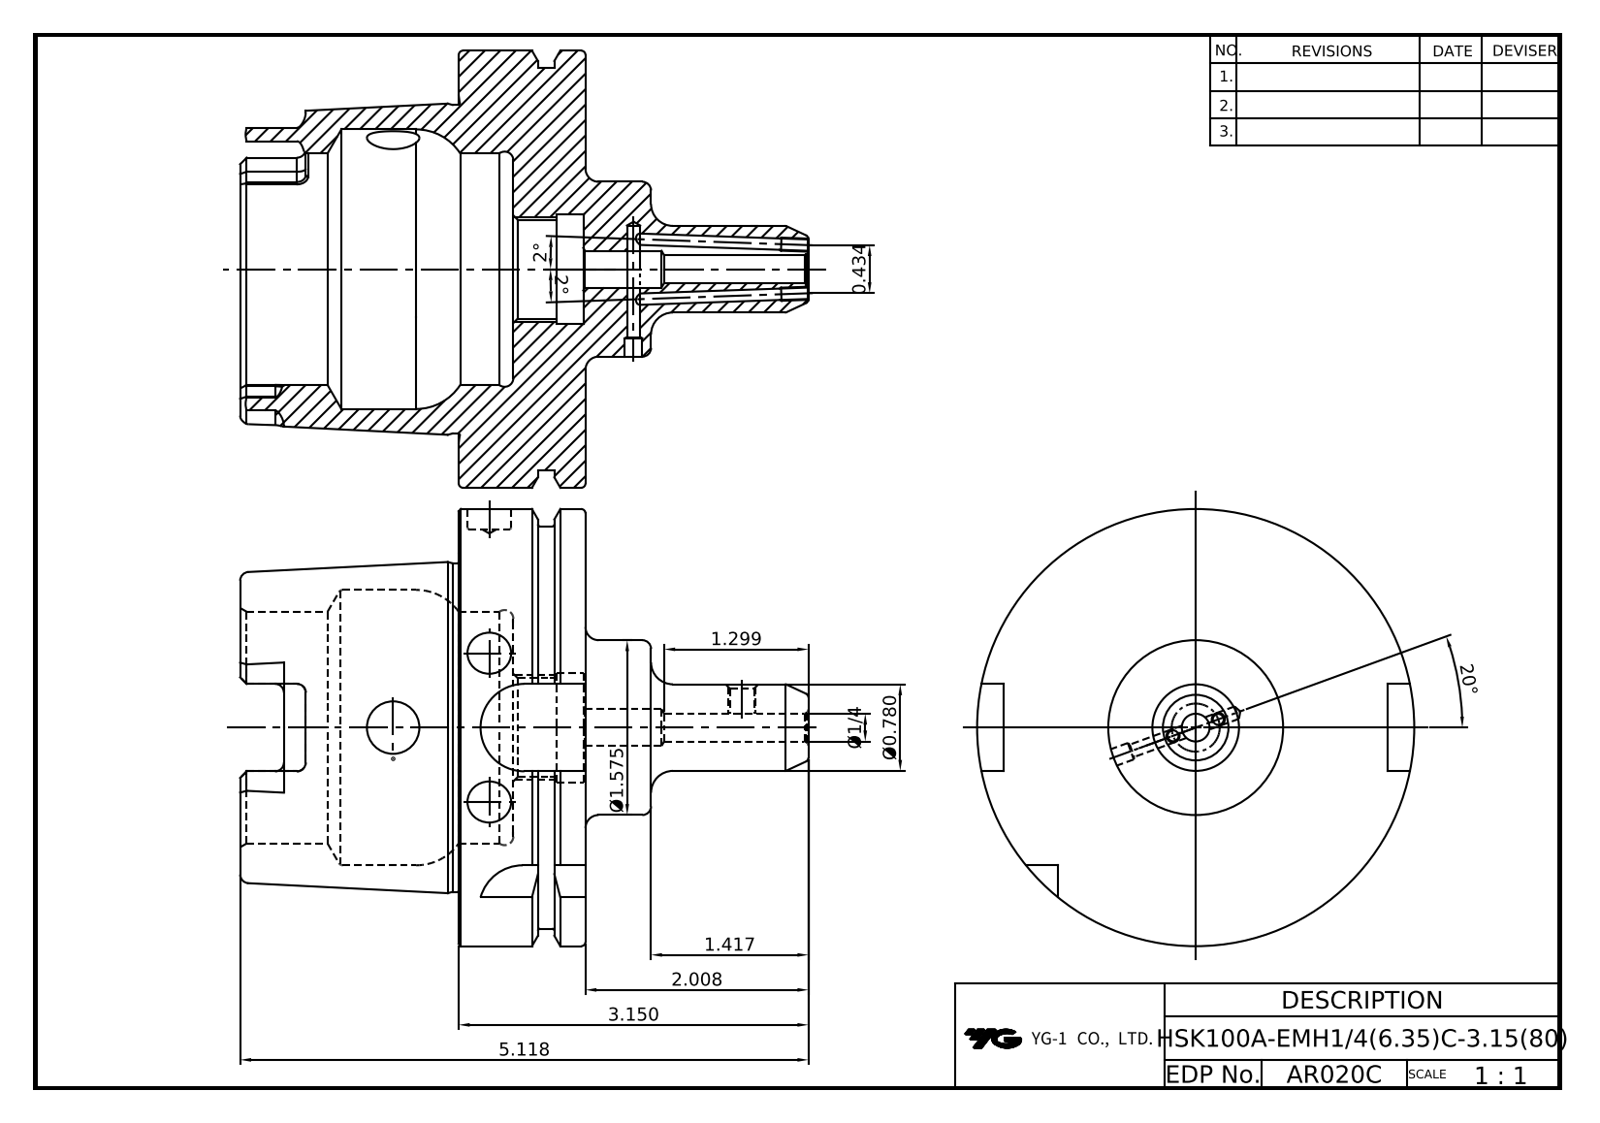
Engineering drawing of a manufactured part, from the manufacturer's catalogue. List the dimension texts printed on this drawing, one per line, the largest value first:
20°
5.118
3.150
2.008
2°
2°
Ø1.575
1.417
1.299
Ø0.780
0.434
Ø1/4
